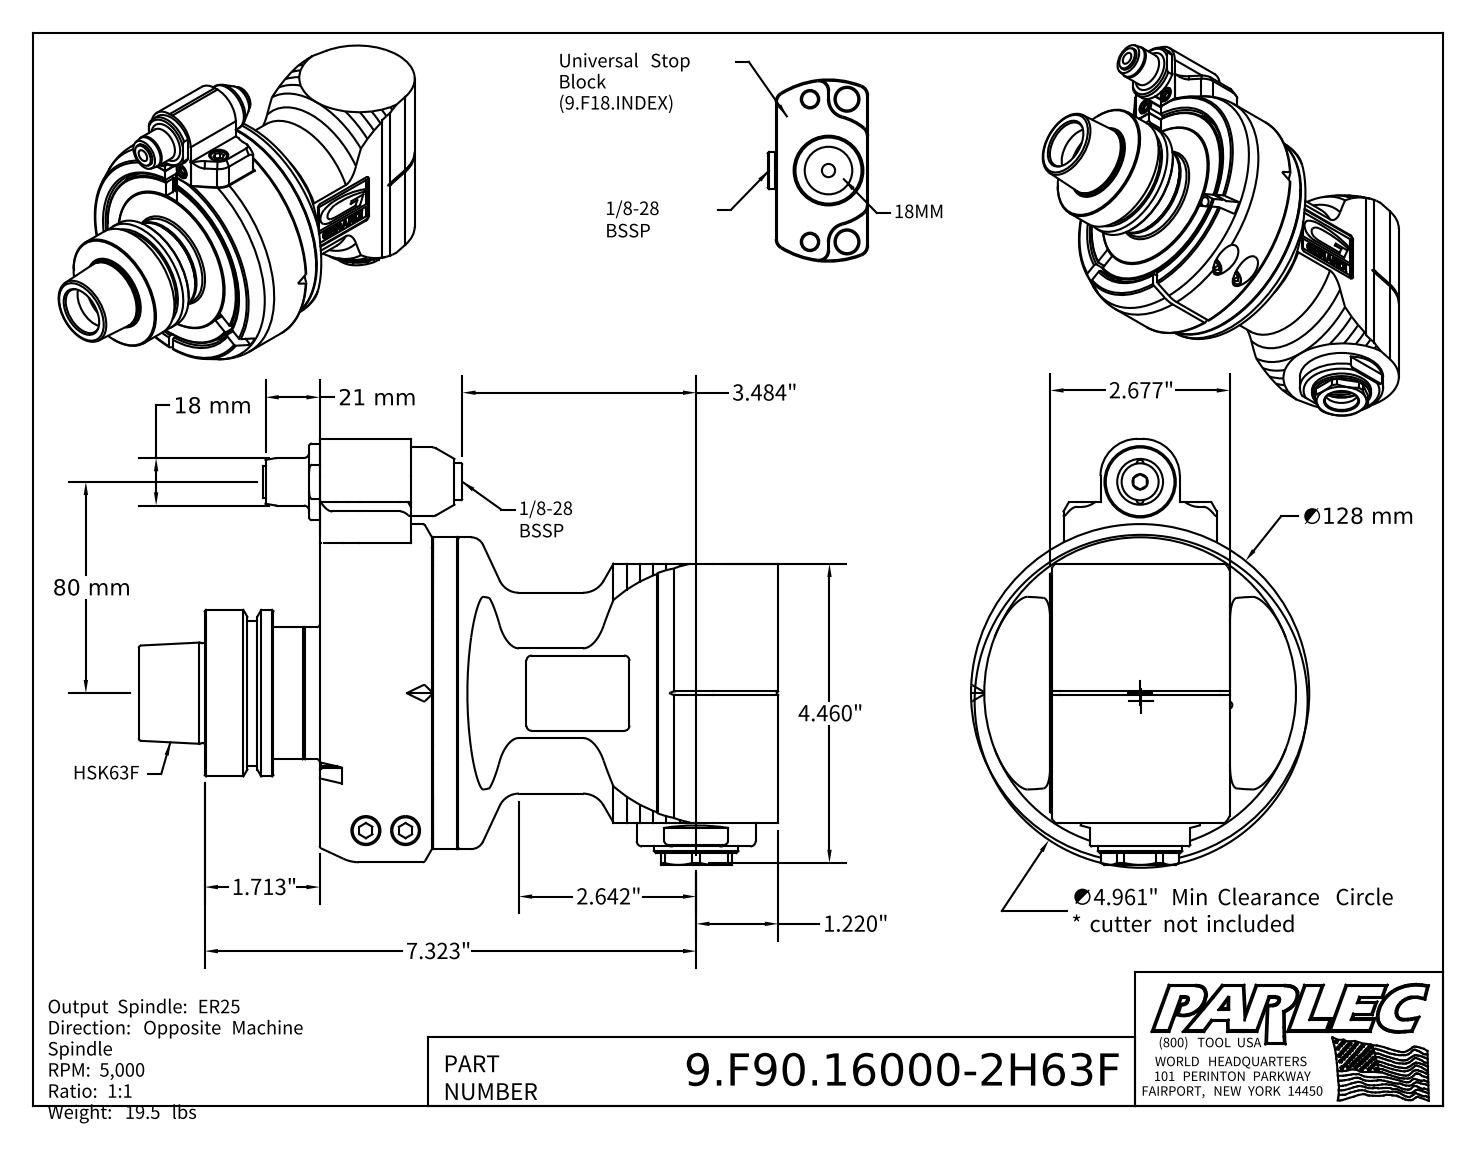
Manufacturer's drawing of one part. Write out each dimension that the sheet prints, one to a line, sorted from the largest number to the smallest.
∅128 mm
80 mm
21 mm
18 mm
7.323"
∅4.961" Min Clearance Circle * cutter not included
4.460"
3.484"
2.677"
2.642"
1.713"
1.220"
